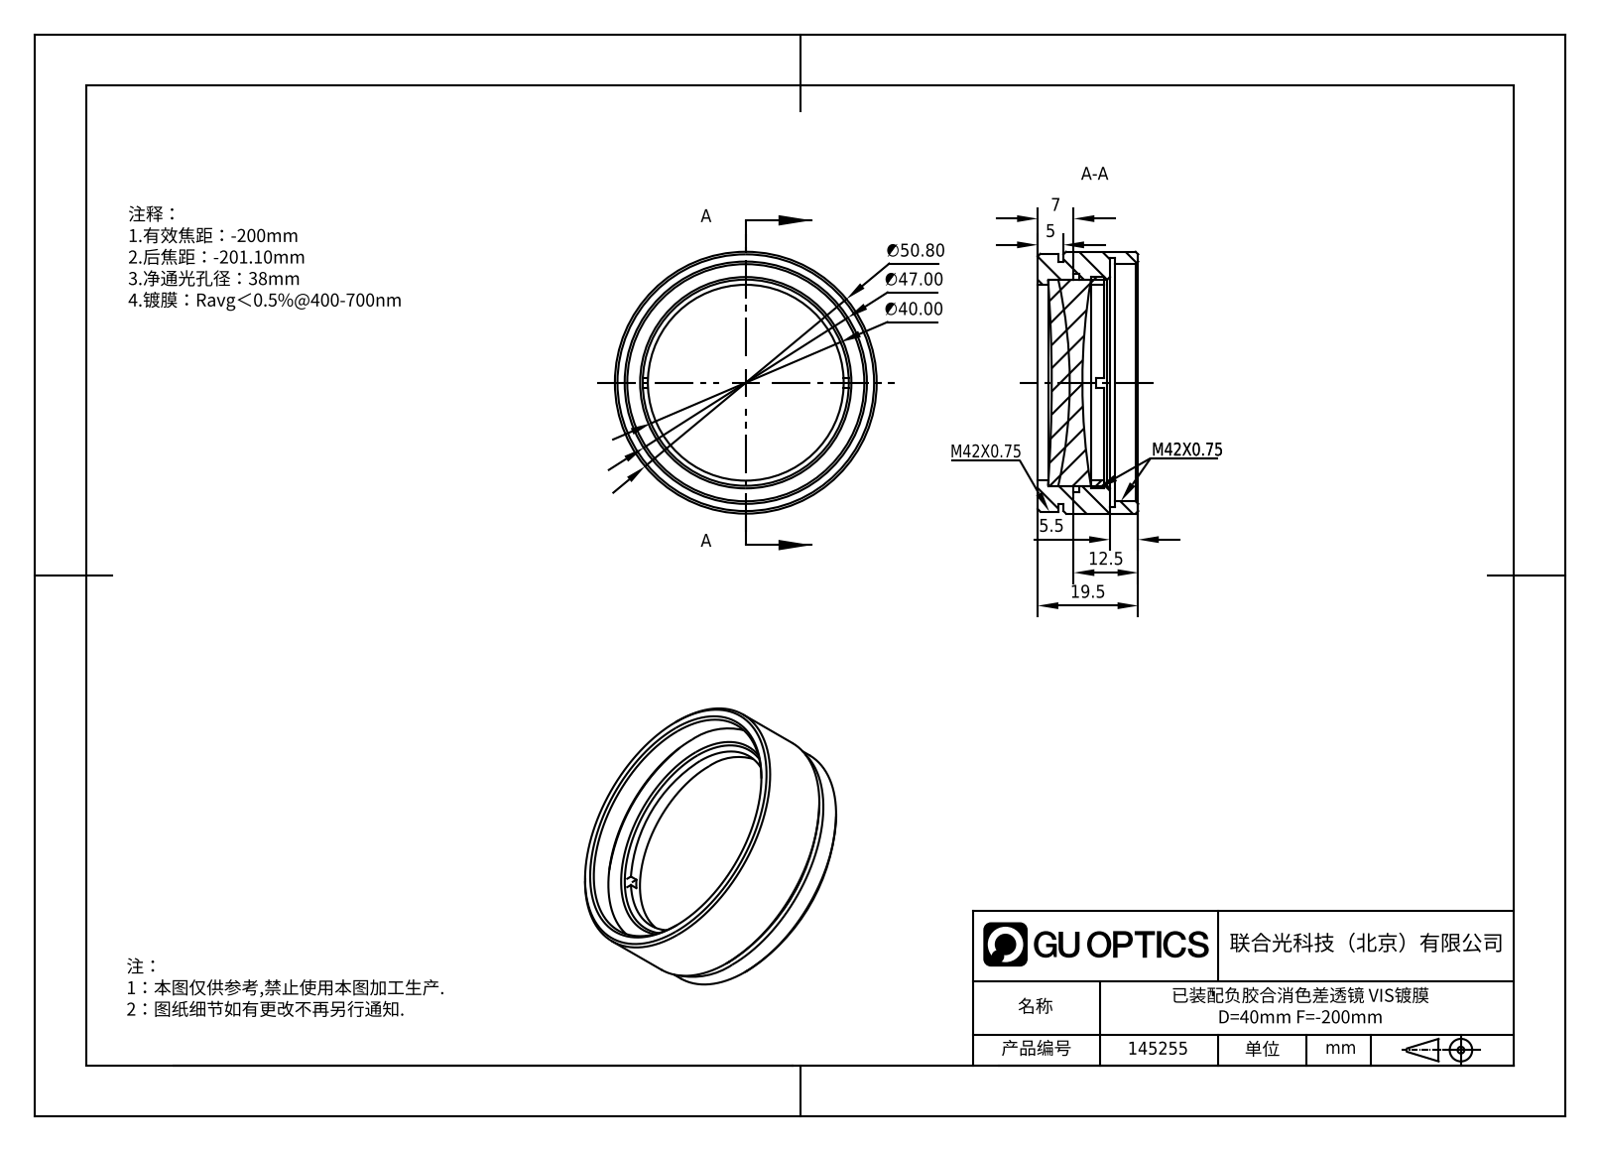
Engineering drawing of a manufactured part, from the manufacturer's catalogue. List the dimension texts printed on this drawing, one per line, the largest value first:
∅50.80
∅47.00
∅40.00
19.5
12.5
7
5.5
5
